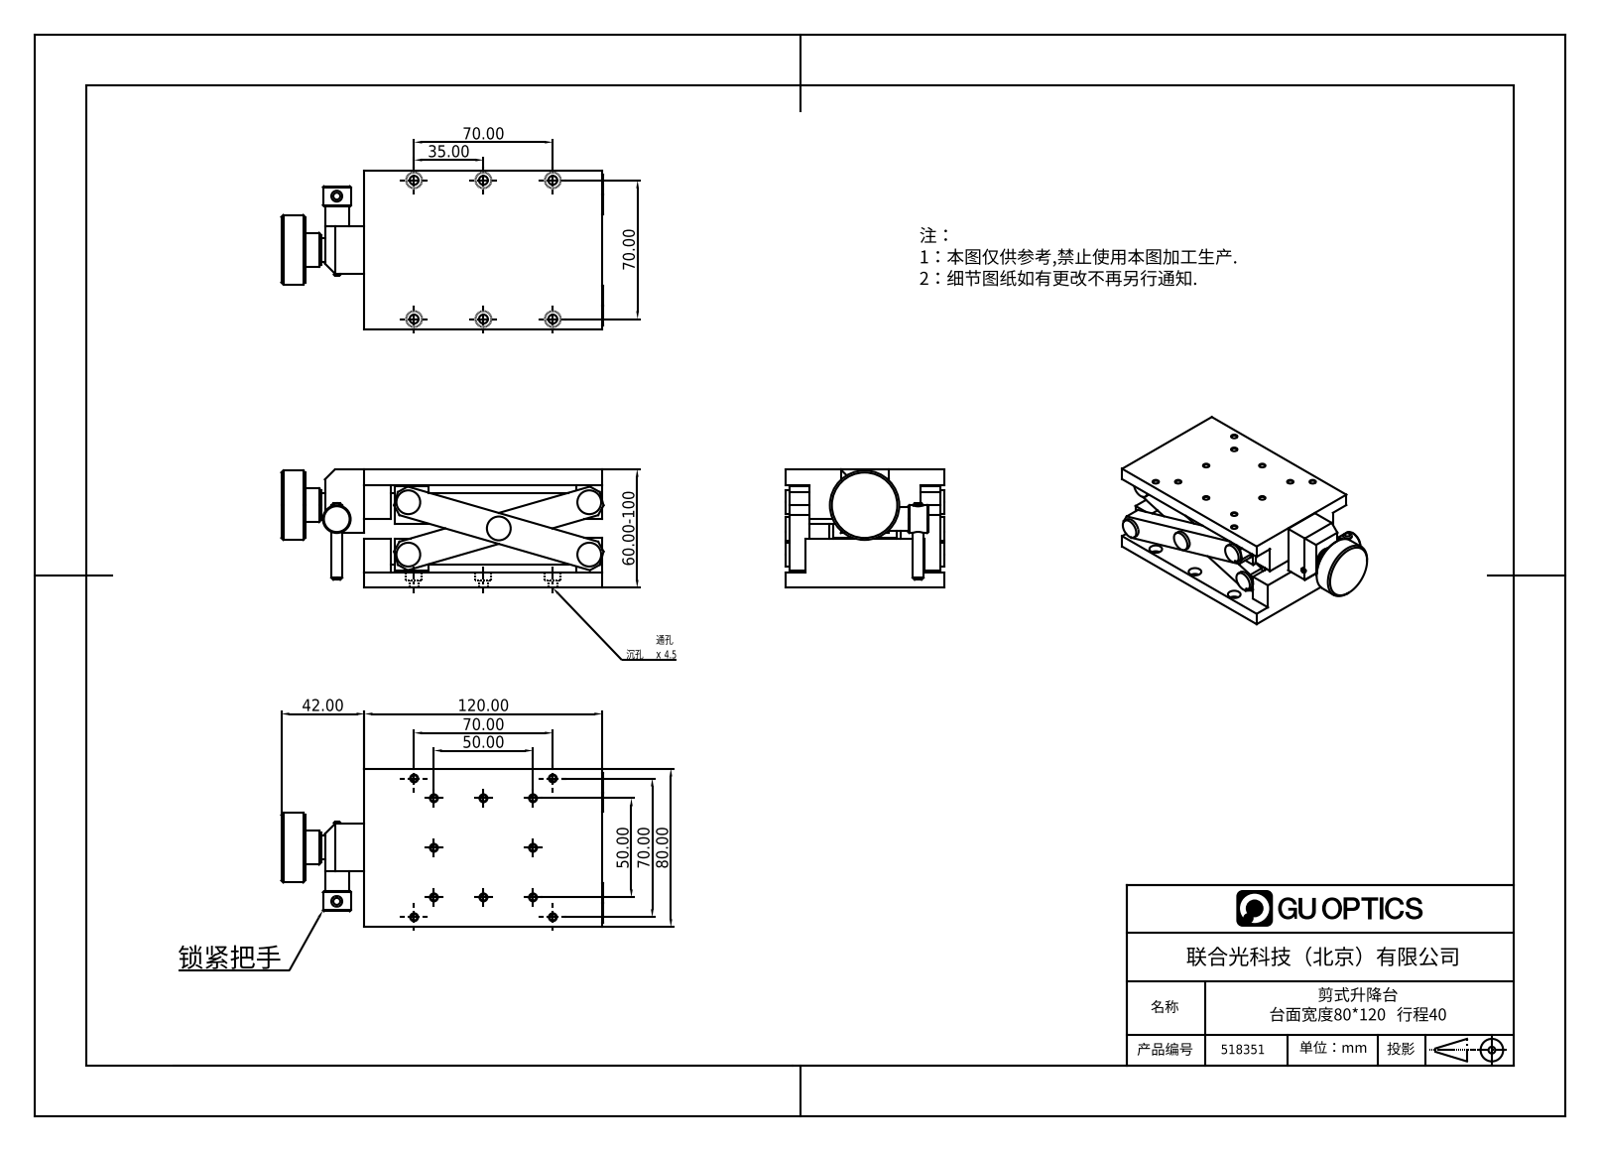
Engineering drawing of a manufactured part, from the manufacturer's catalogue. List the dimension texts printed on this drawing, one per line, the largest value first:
120.00
80.00
70.00
70.00
70.00
70.00
60.00-100
50.00
50.00
42.00
35.00
